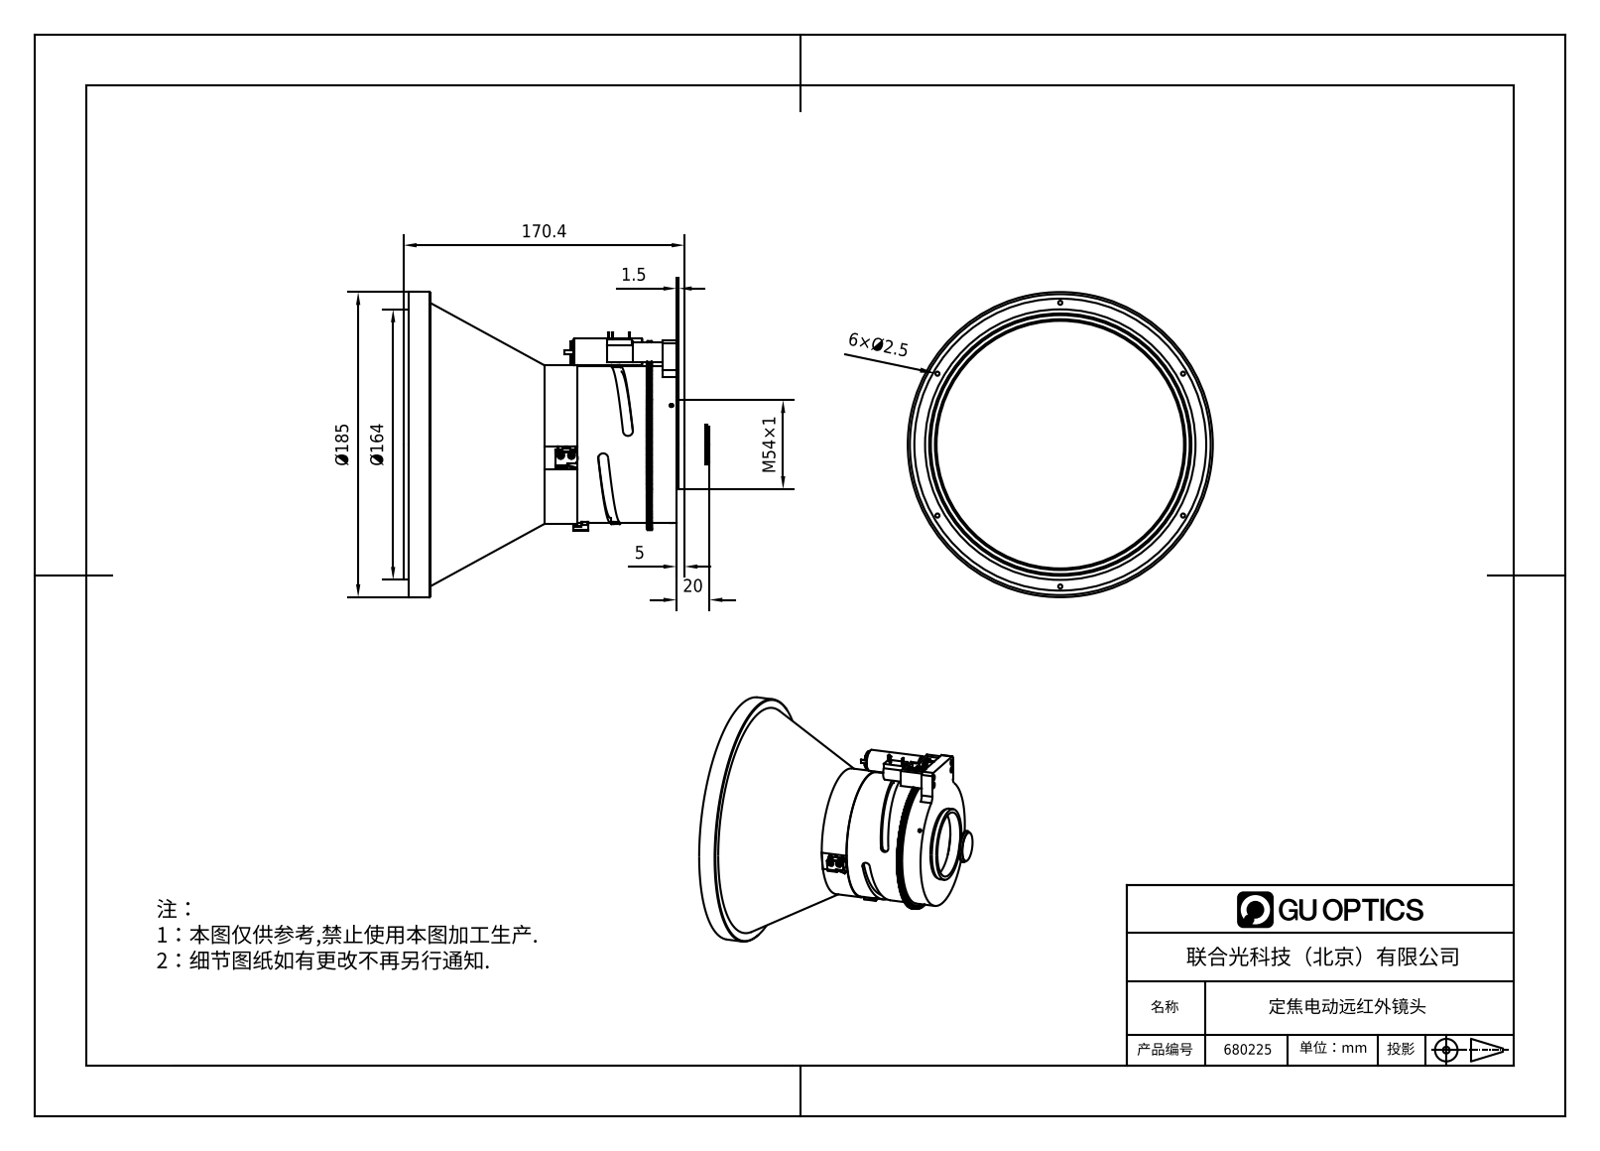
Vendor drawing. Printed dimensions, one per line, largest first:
Ø185
170.4
Ø164
M54×1
20
5
6×Ø2.5
1.5
